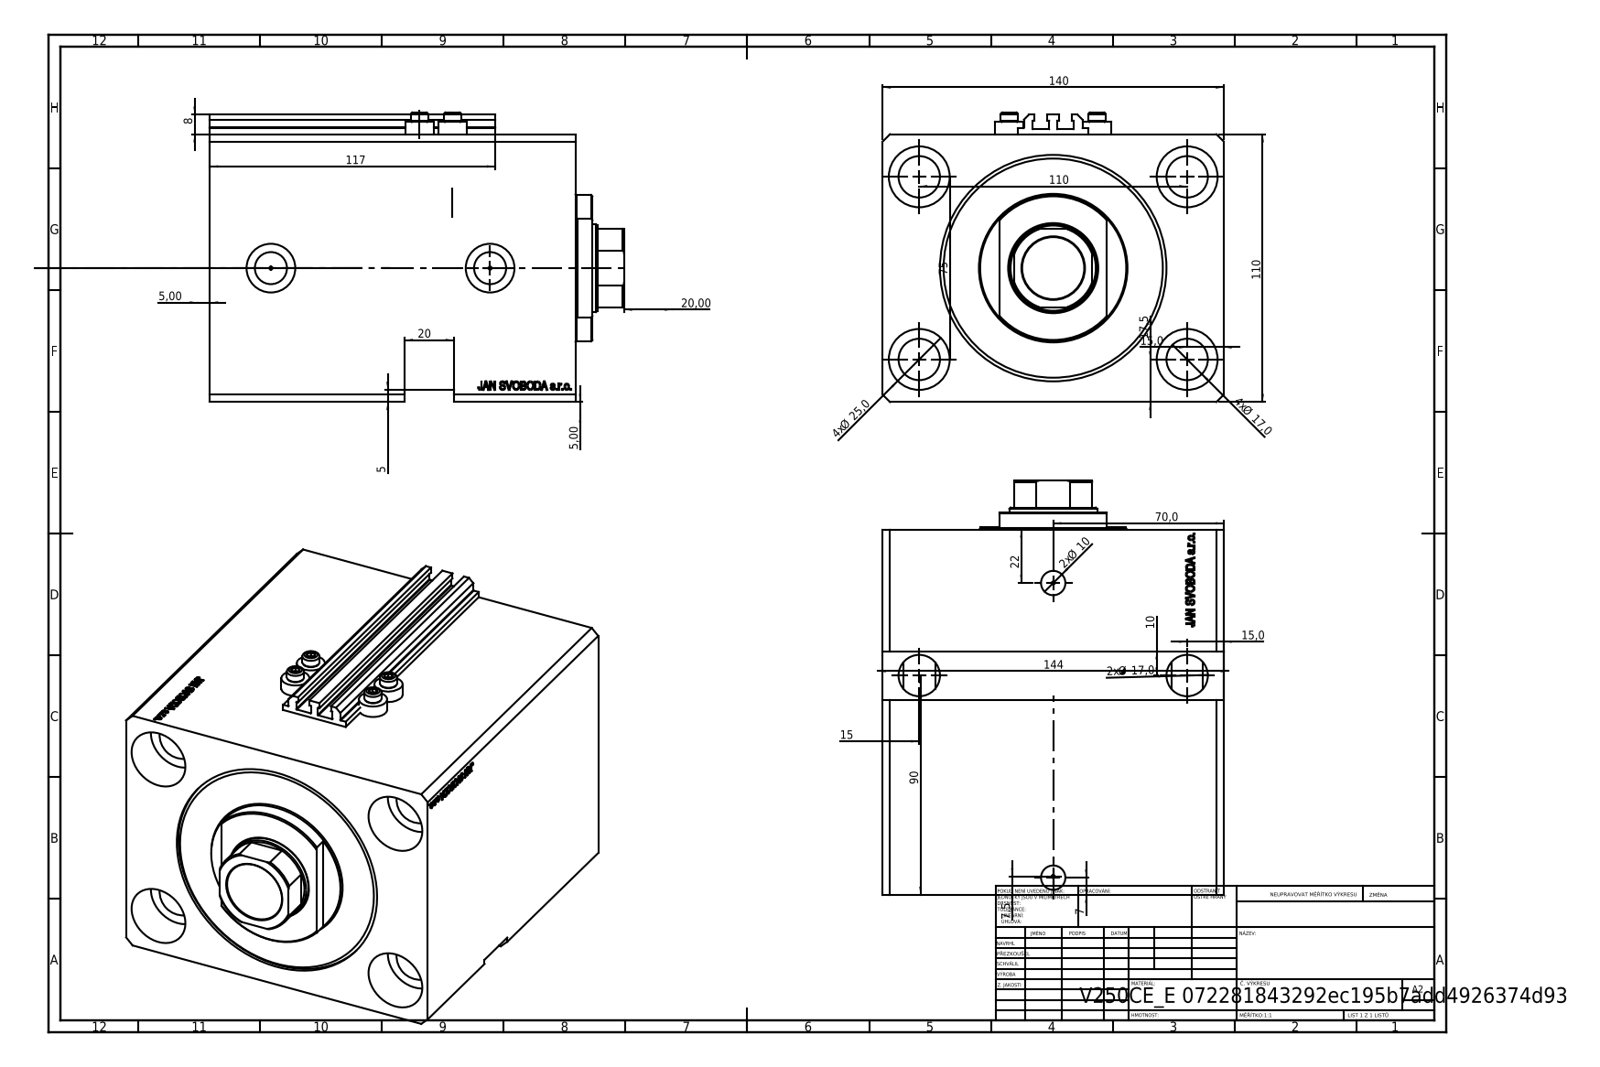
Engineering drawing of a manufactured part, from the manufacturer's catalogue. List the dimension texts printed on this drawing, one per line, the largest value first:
144
140
117
110
110
90
75
70,0
4x Ø 25,0
22
20,00
20
17,5
4x Ø 17,0
2x Ø 17,0
15,0
15,0
15
2x Ø 10
10
8
7,5
7
5,00
5,00
5
